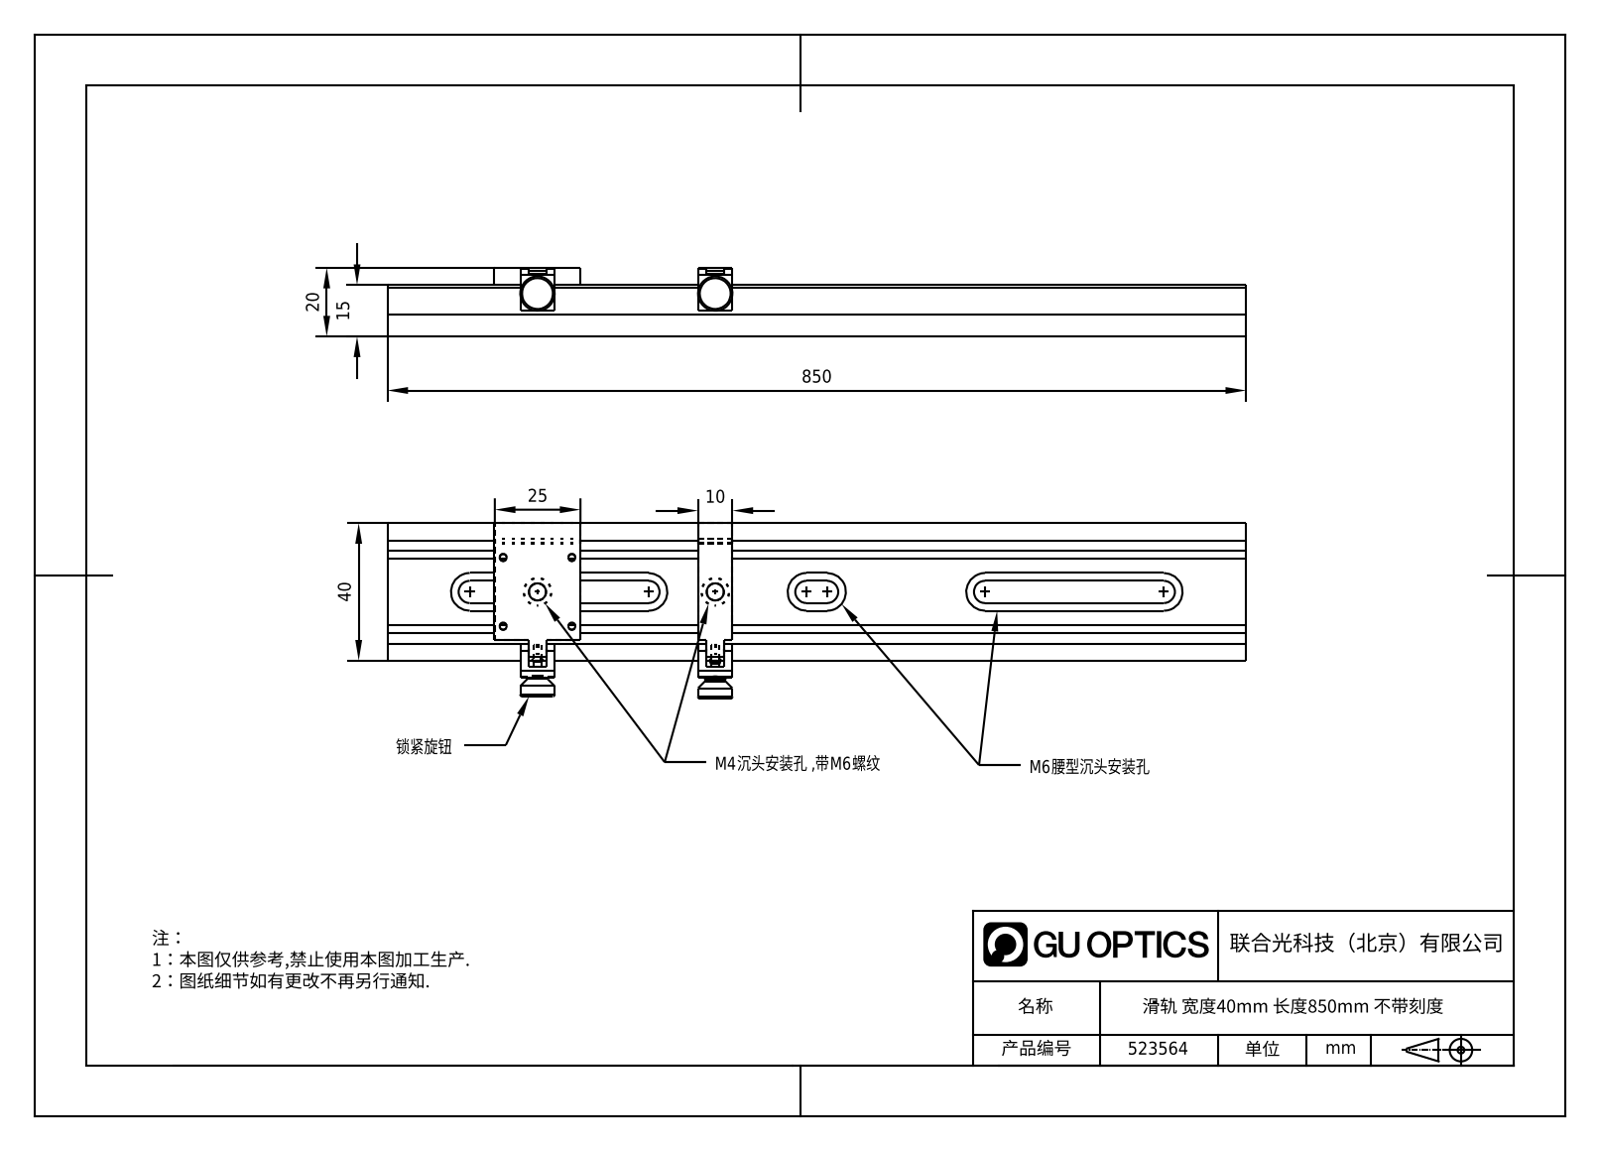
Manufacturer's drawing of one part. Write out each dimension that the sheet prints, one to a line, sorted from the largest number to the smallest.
850
40
25
20
15
10
